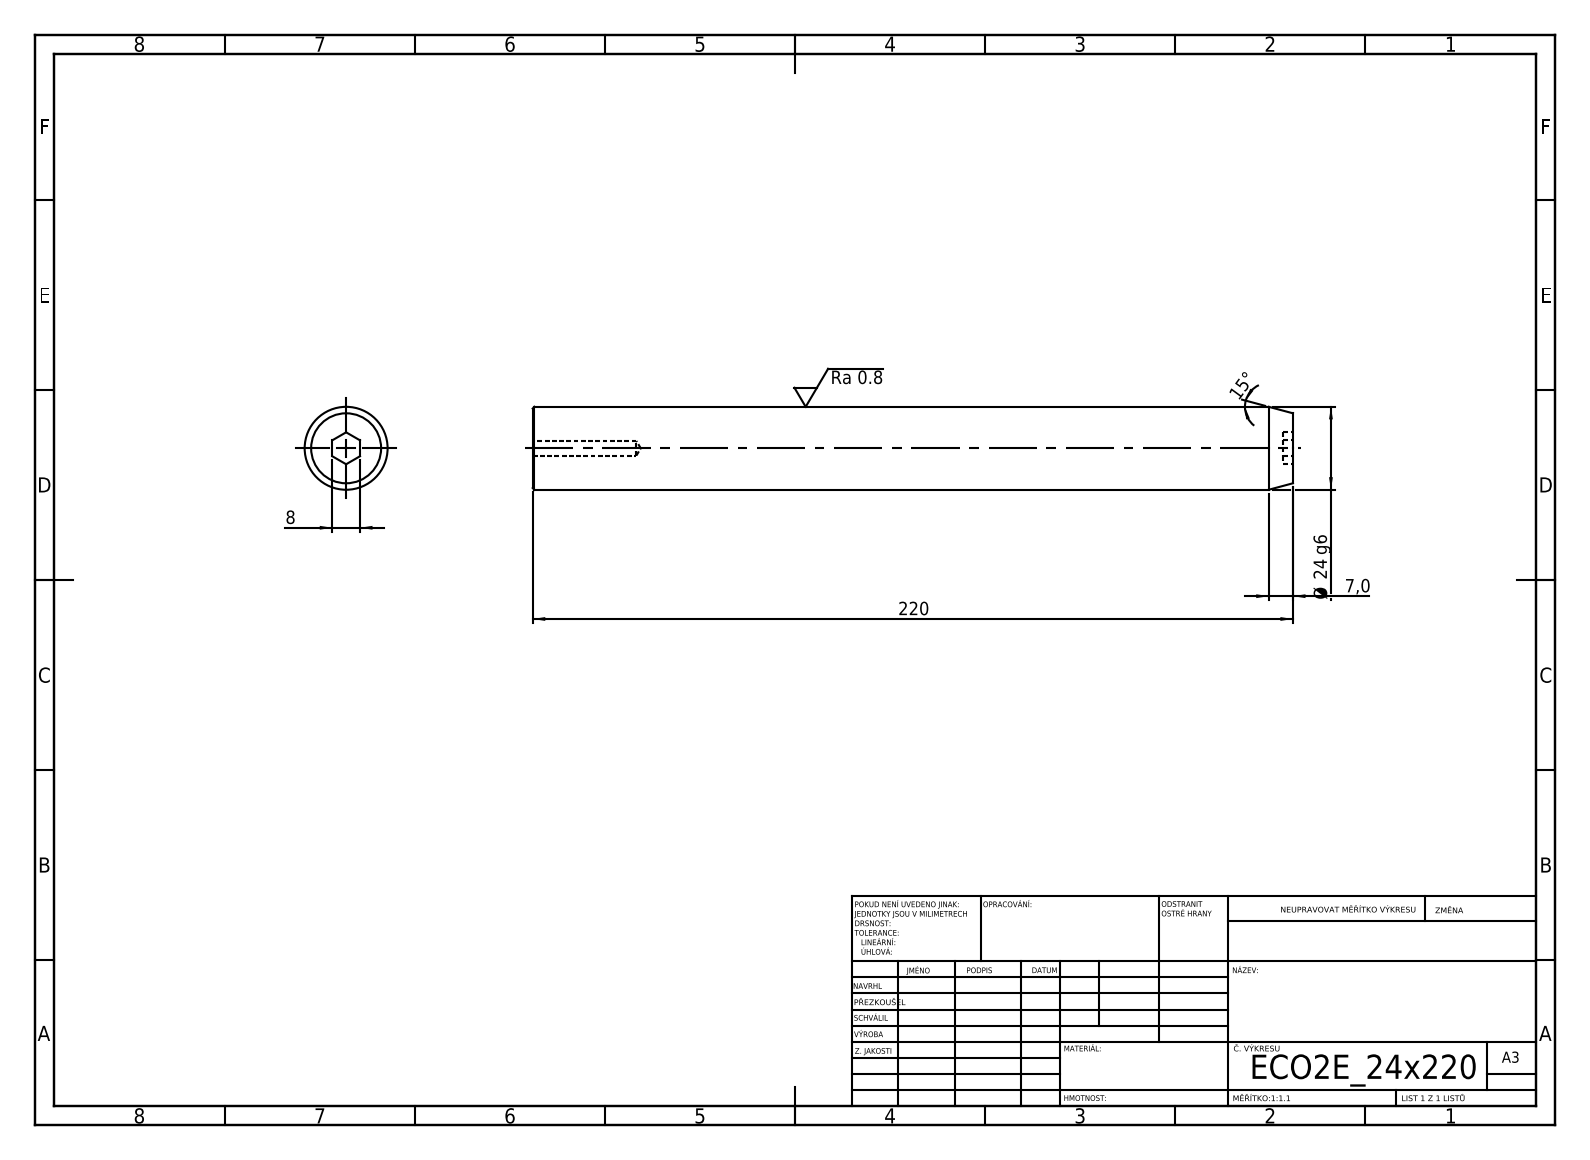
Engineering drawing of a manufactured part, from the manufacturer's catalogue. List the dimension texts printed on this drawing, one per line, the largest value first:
220
Ø 24 g6
15°
8
7,0
